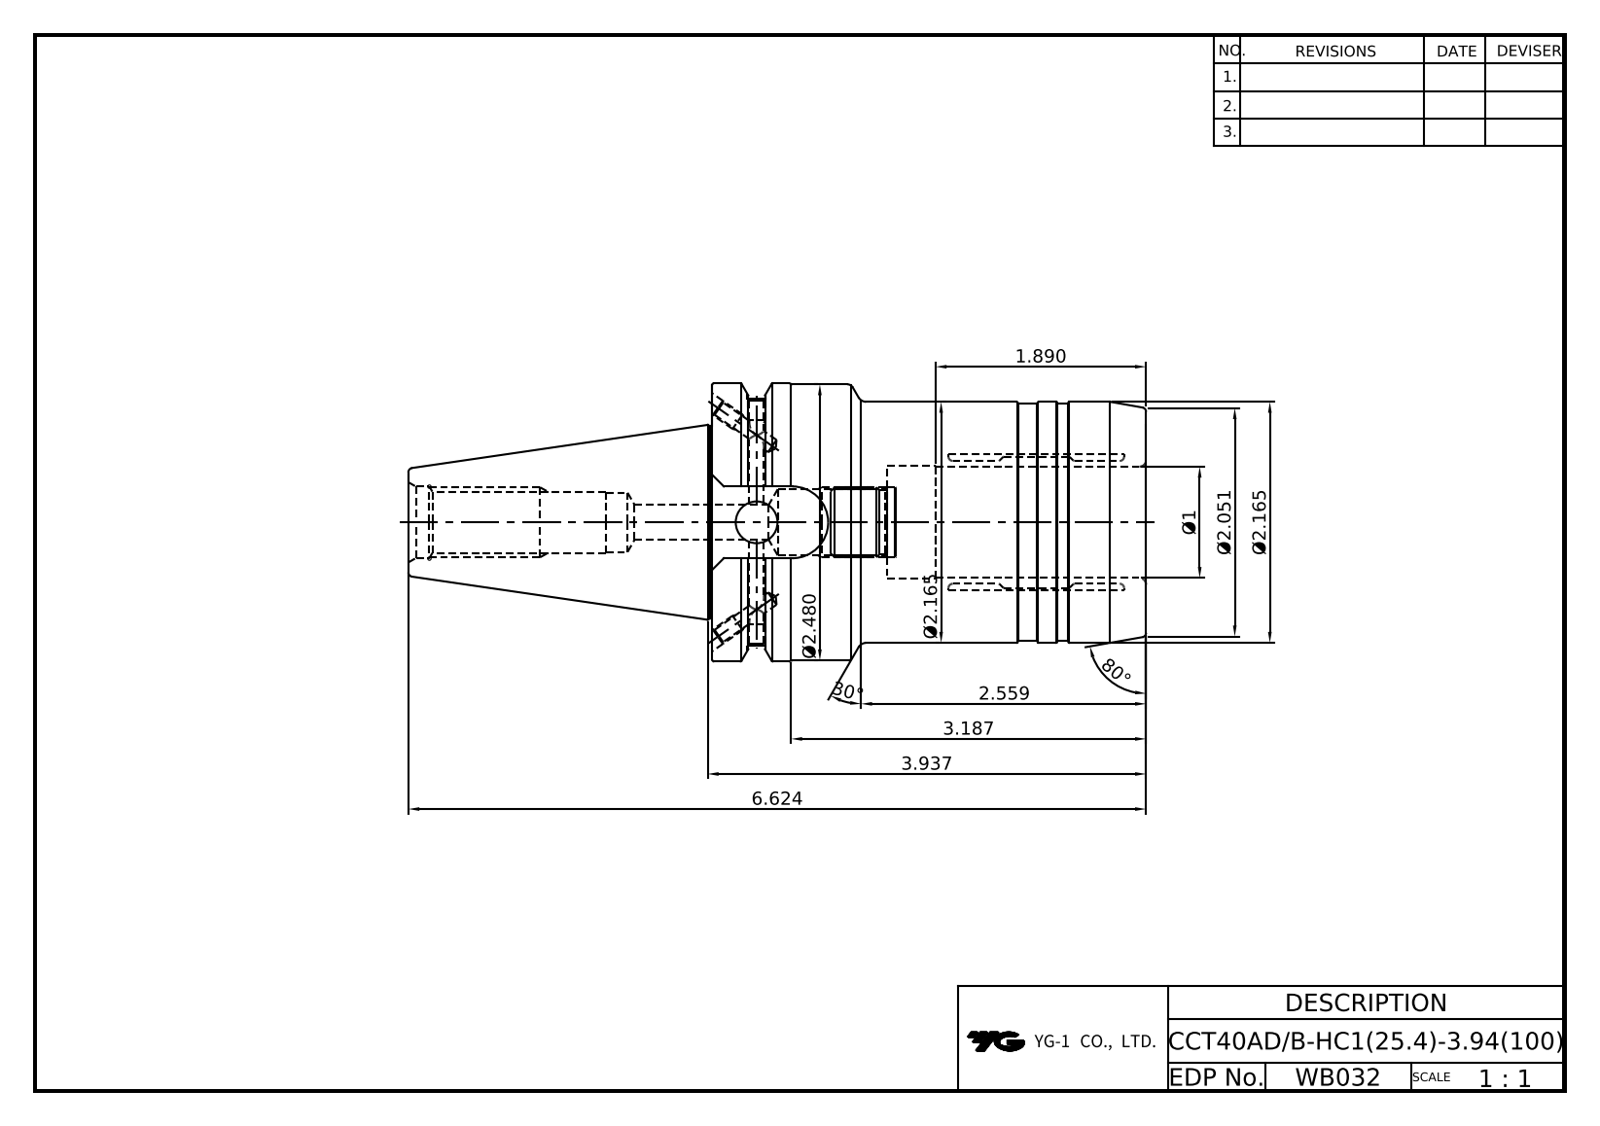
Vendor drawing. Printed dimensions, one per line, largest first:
80°
30°
6.624
3.937
3.187
2.559
Ø2.480
Ø2.165
Ø2.165
Ø2.051
1.890
Ø1
